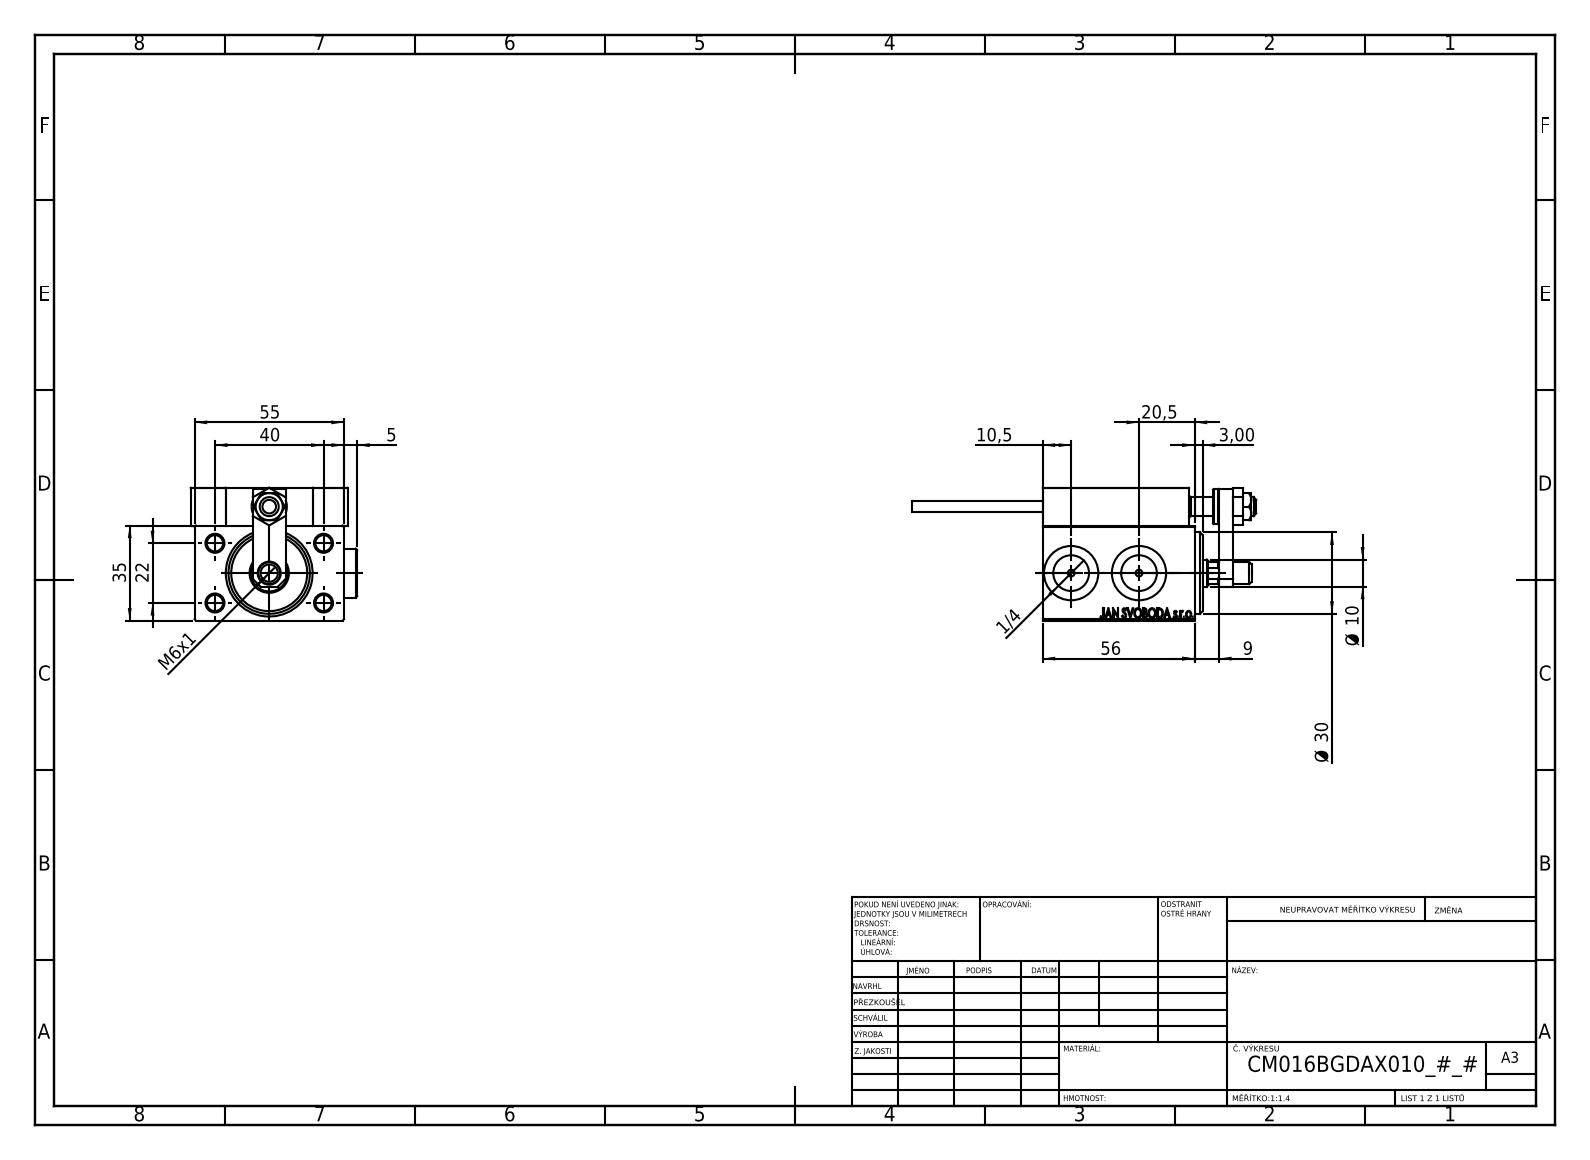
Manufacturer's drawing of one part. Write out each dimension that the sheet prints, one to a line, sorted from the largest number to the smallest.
56
55
40
35
Ø 30
22
20,5
10,5
Ø 10
9
M6x1
5
3,00
1/4
